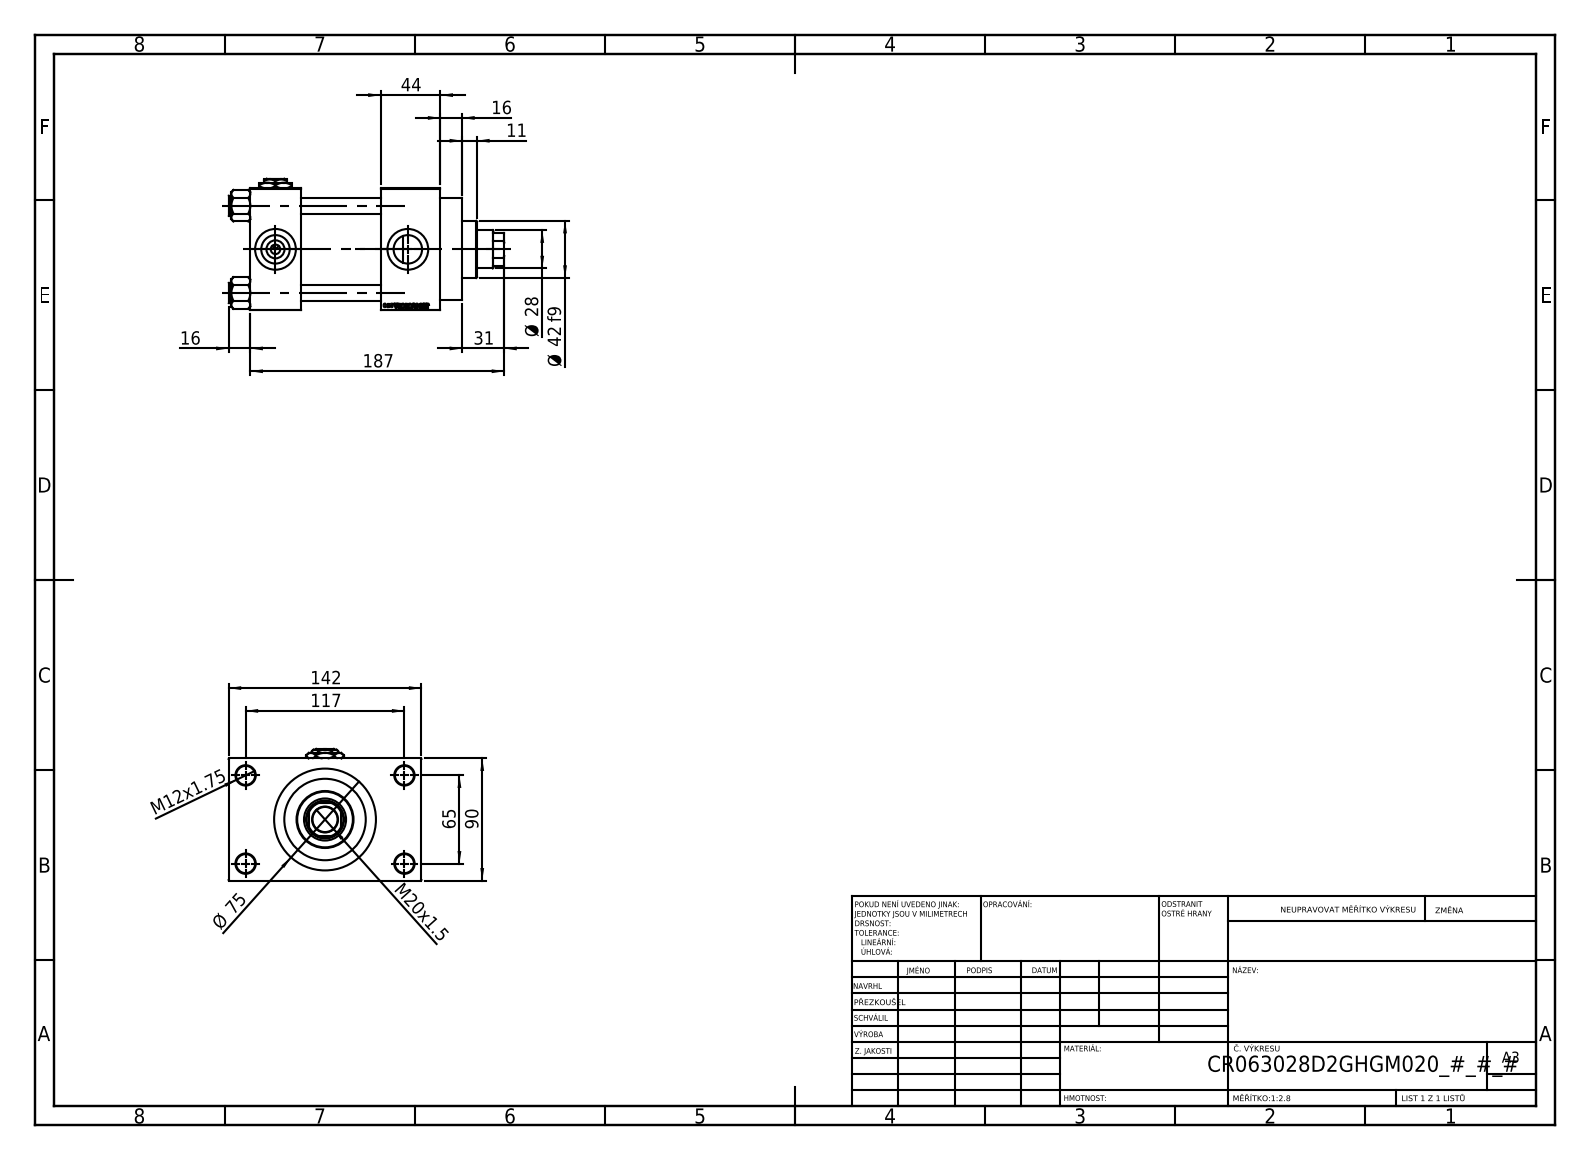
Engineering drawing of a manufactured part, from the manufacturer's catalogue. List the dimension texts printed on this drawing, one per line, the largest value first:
187
142
117
90
Ø 75
65
44
Ø 42 f9
31
Ø 28
M20x1.5
16
16
M12x1.75
11
